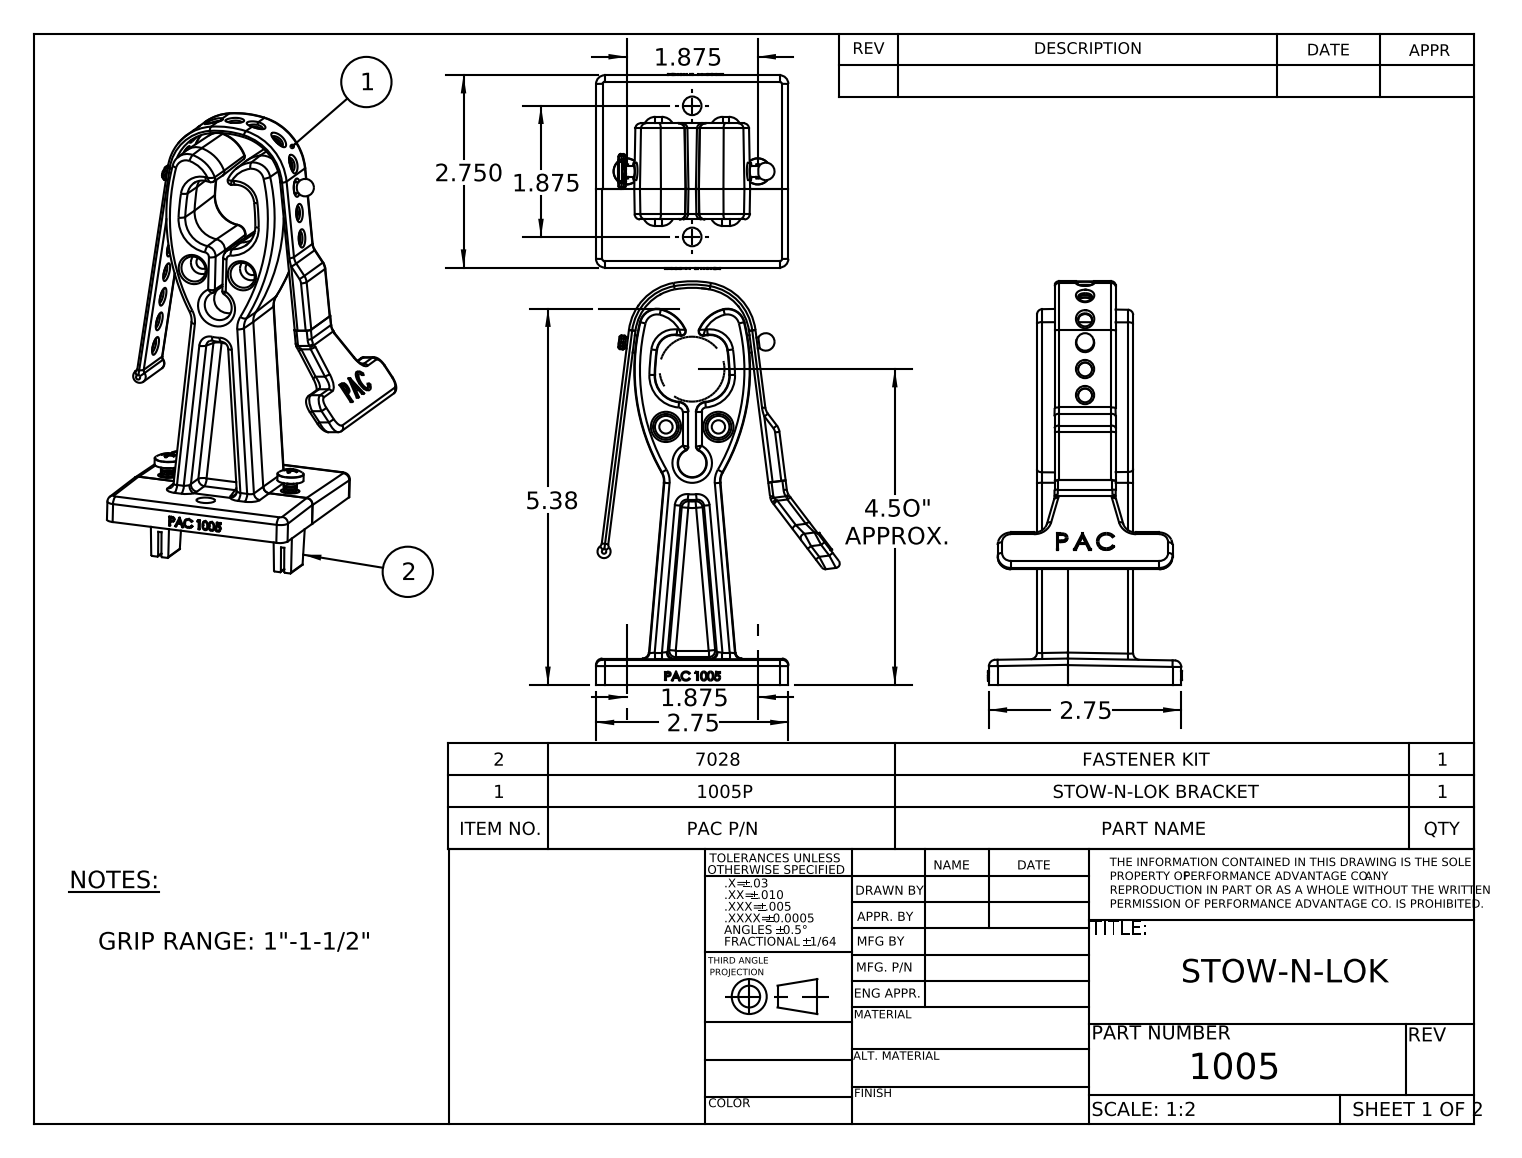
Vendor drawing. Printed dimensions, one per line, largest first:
5.38
APPROX. 4.5O"
2.75
2.75
2.750
1.875
1.875
1.875
